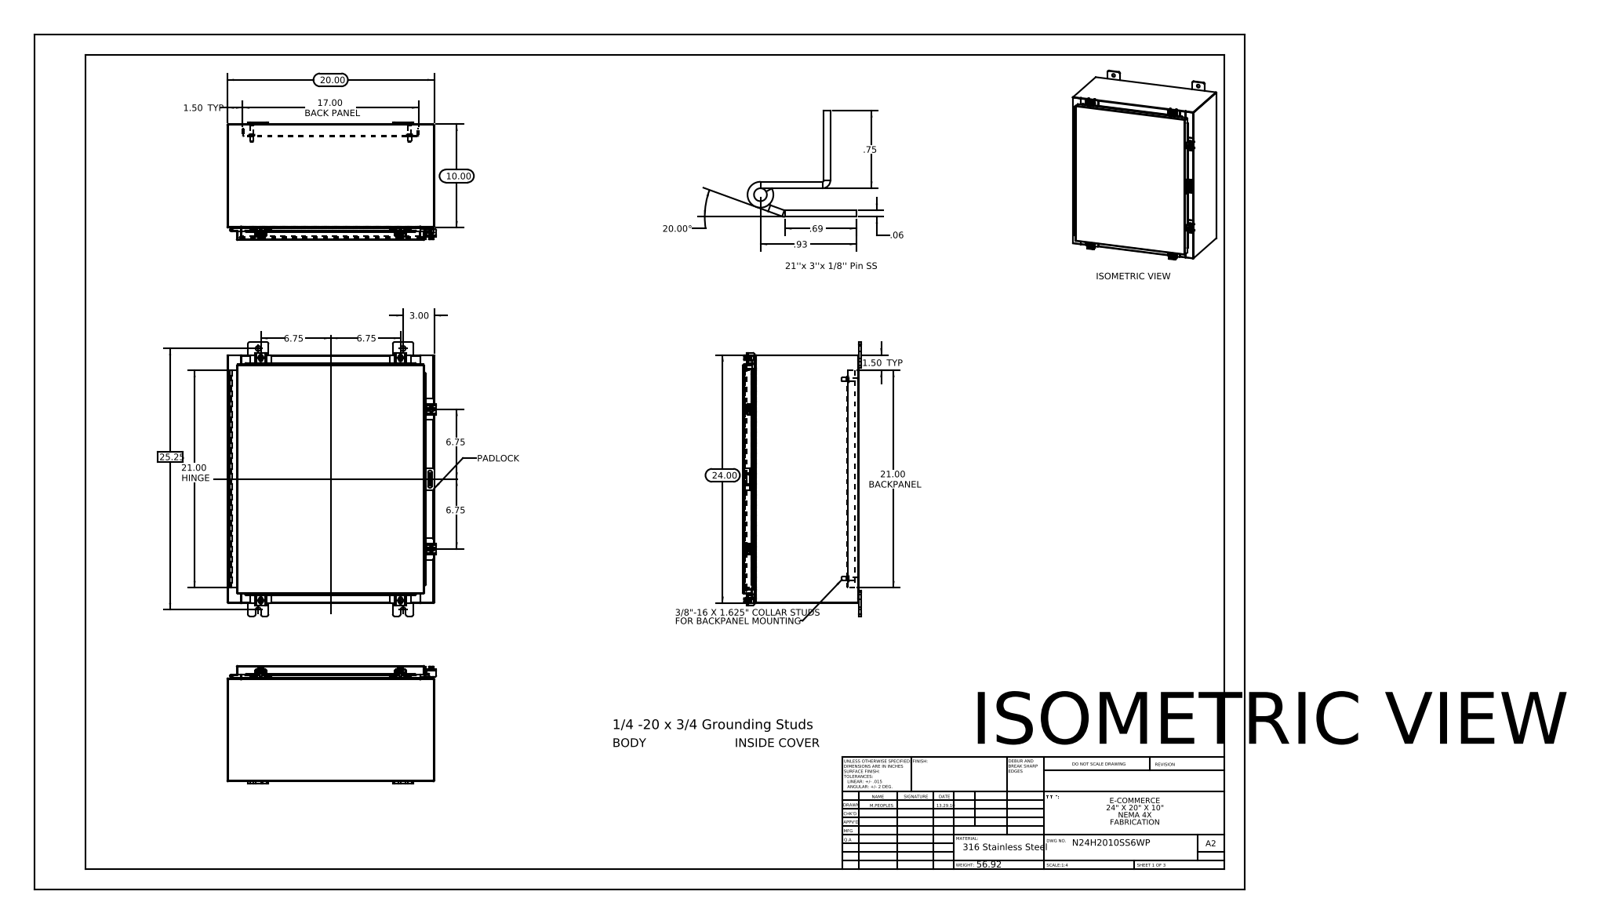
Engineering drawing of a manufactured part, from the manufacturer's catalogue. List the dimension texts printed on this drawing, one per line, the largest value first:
25.25
24.00
21.00 HINGE
21.00 BACKPANEL
20.00
20.00°
17.00 BACK PANEL
10.00
6.75
6.75
6.75
6.75
3.00
1.50 TYP
1.50 TYP
.93
.75
.69
.06
